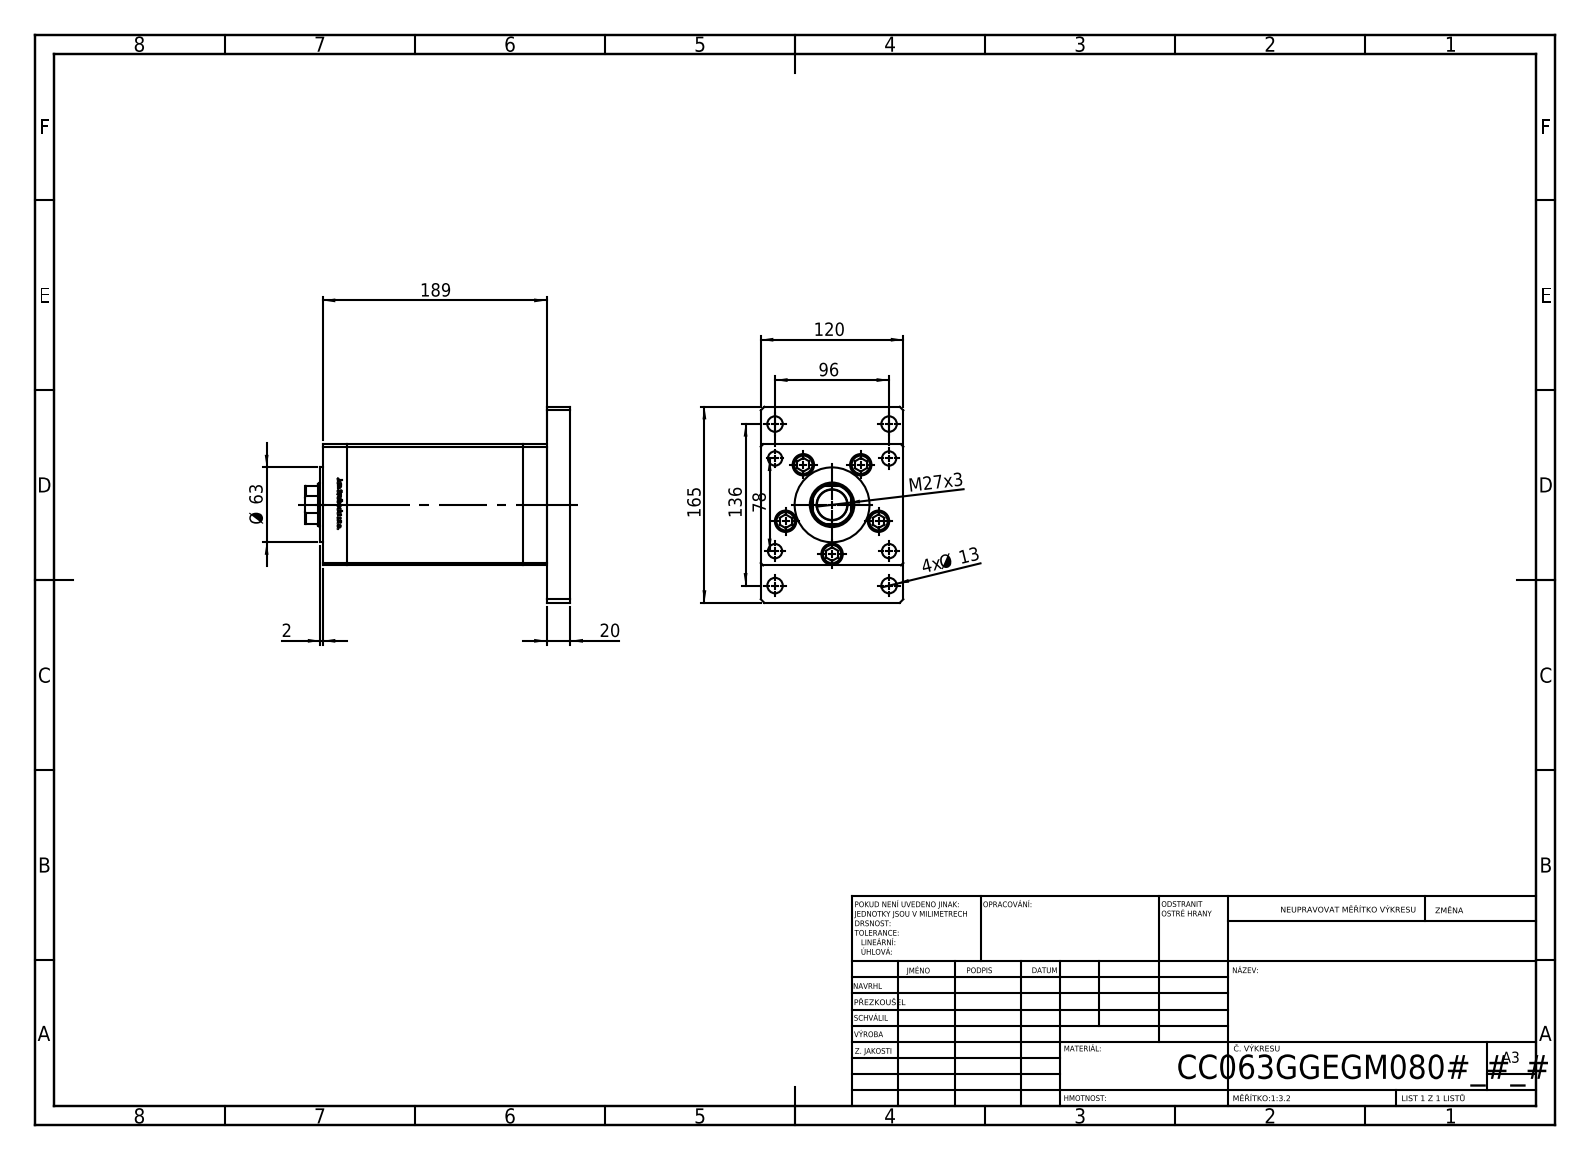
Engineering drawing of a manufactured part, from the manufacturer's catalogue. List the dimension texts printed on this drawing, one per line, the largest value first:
189
165
136
120
96
78
Ø 63
M27x3
20
4x Ø 13
2
